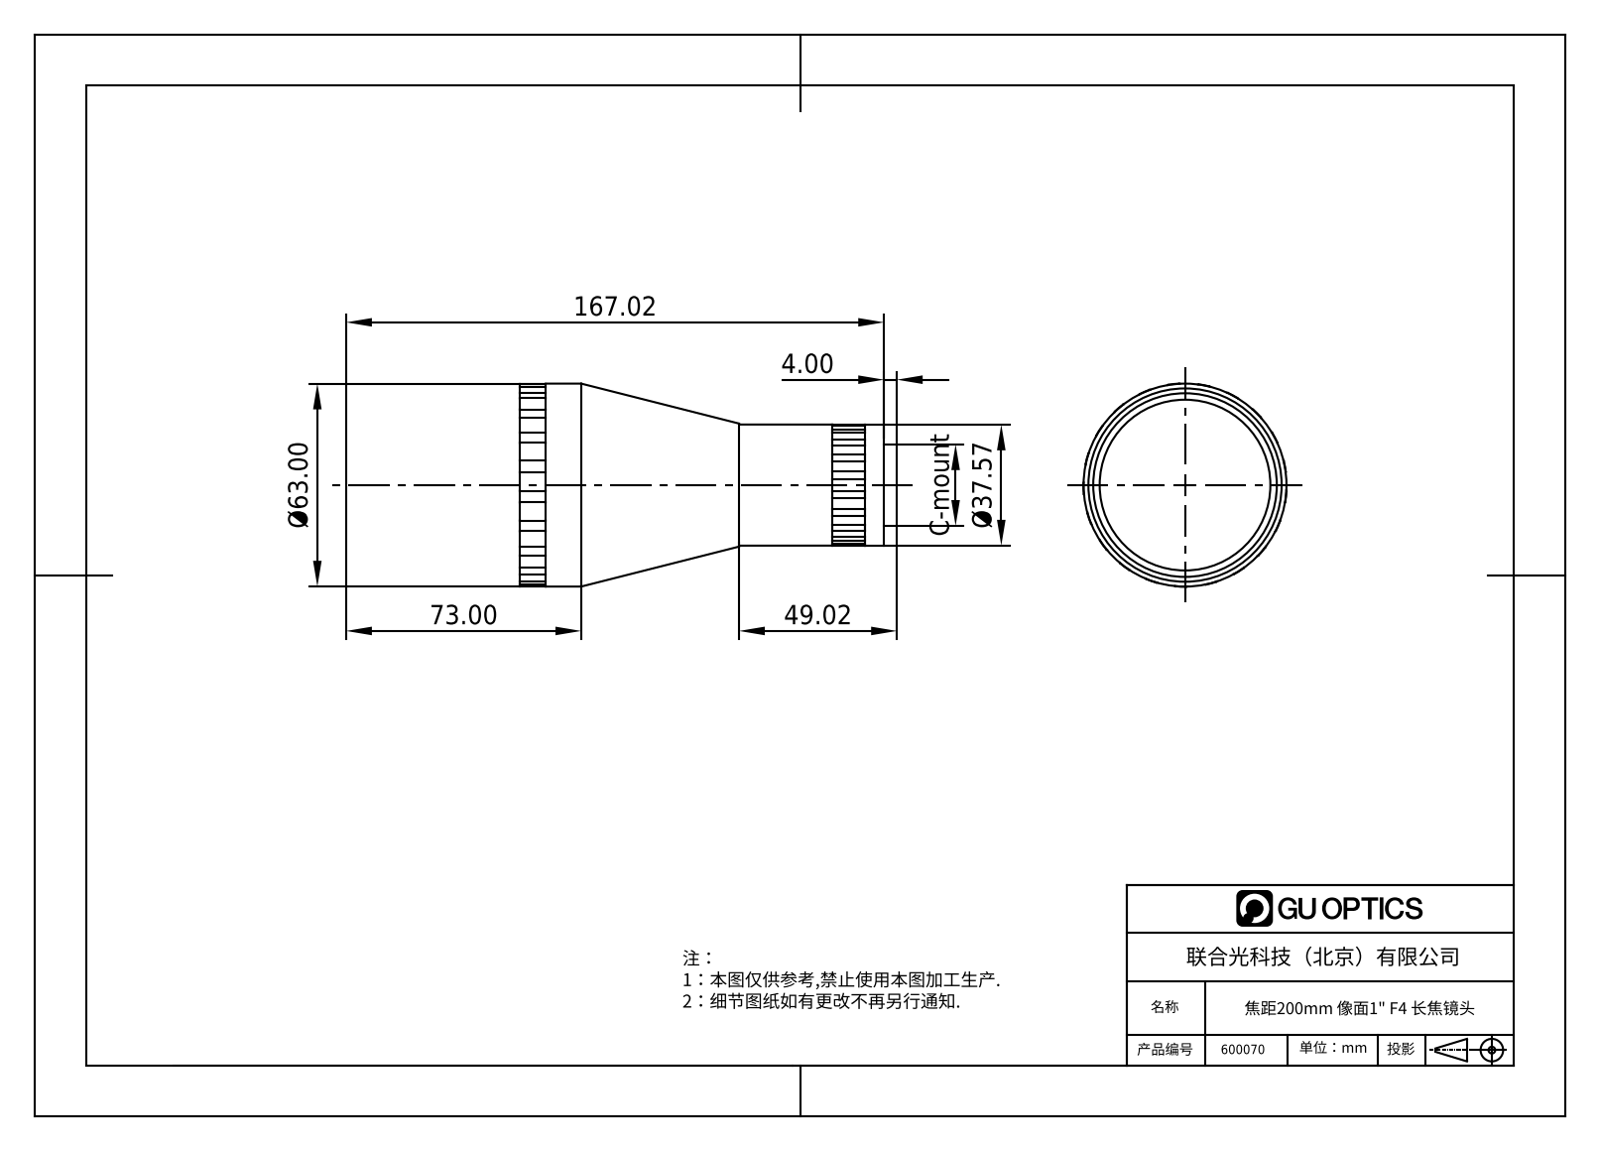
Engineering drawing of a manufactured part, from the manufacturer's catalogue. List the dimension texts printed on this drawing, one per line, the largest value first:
167.02
73.00
Ø63.00
49.02
Ø37.57
4.00
C-mount
